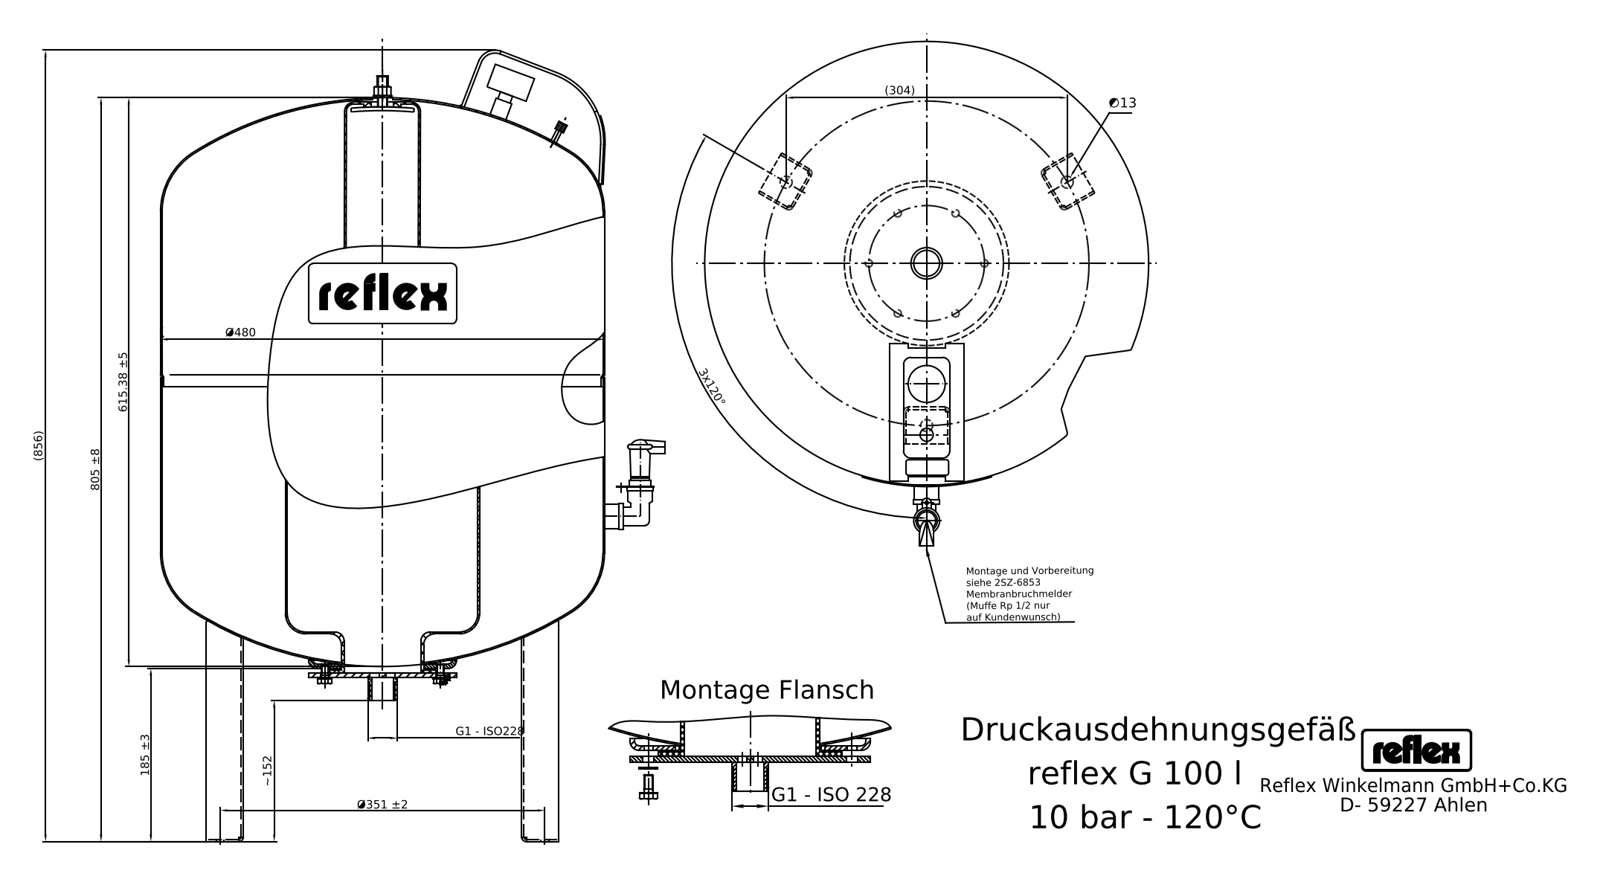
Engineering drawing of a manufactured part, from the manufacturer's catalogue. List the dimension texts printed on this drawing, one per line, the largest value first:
(856)
805 ±8
615.38 ±5
Ø480
Ø351 ±2
(304)
185 ±3
~152
3x120°
∅13
G1 - ISO228
G1 - ISO 228
